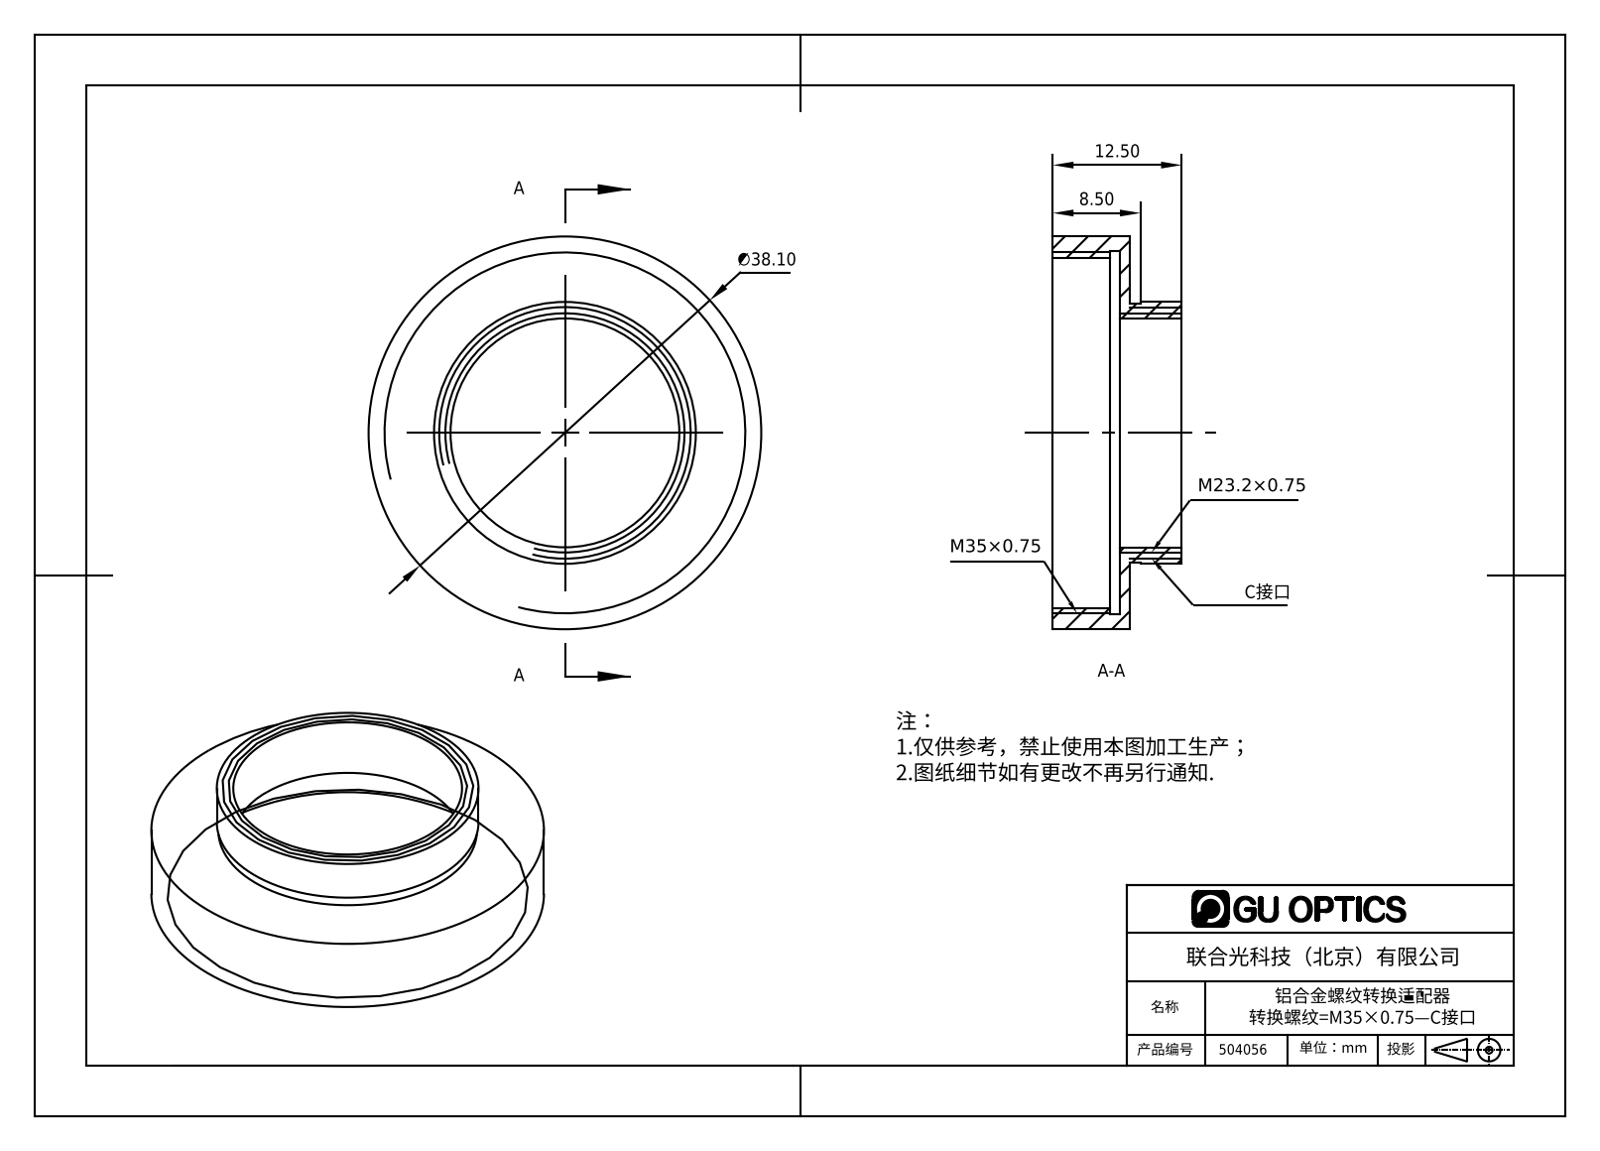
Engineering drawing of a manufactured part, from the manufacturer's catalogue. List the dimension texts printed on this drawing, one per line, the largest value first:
∅38.10
12.50
8.50
